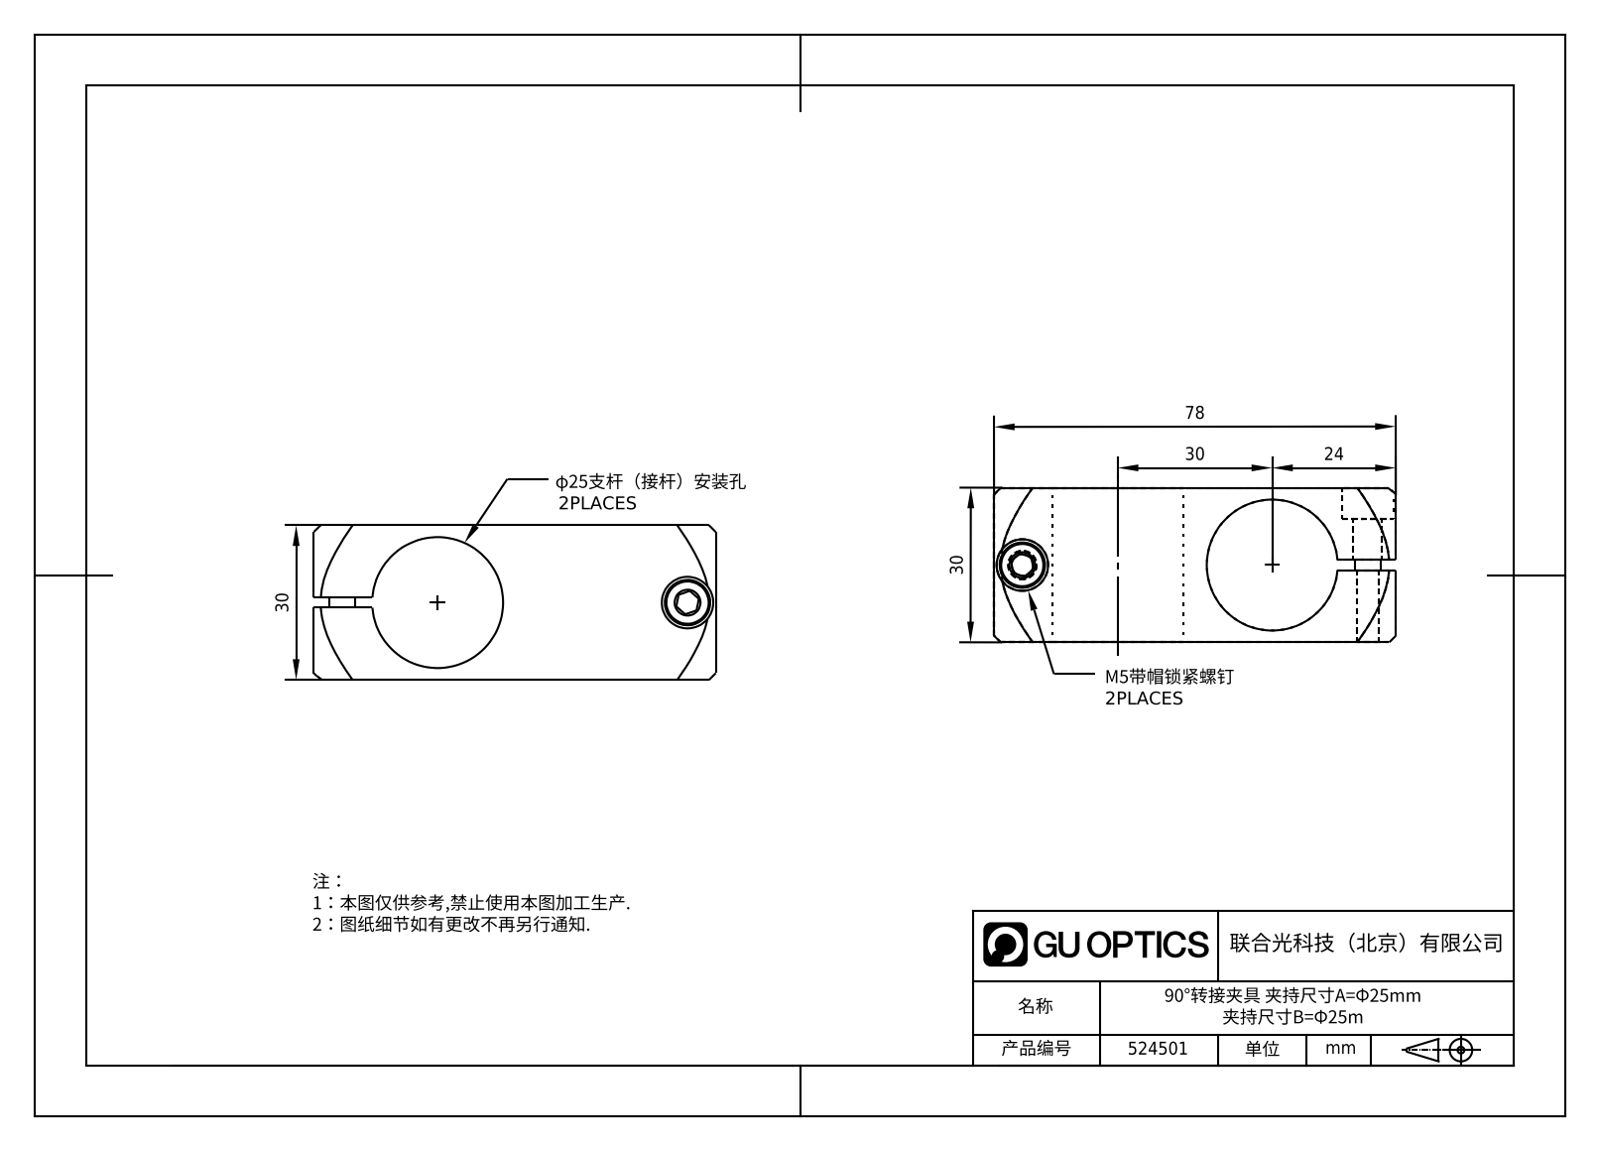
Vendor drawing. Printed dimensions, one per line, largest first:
78
30
30
30
24
